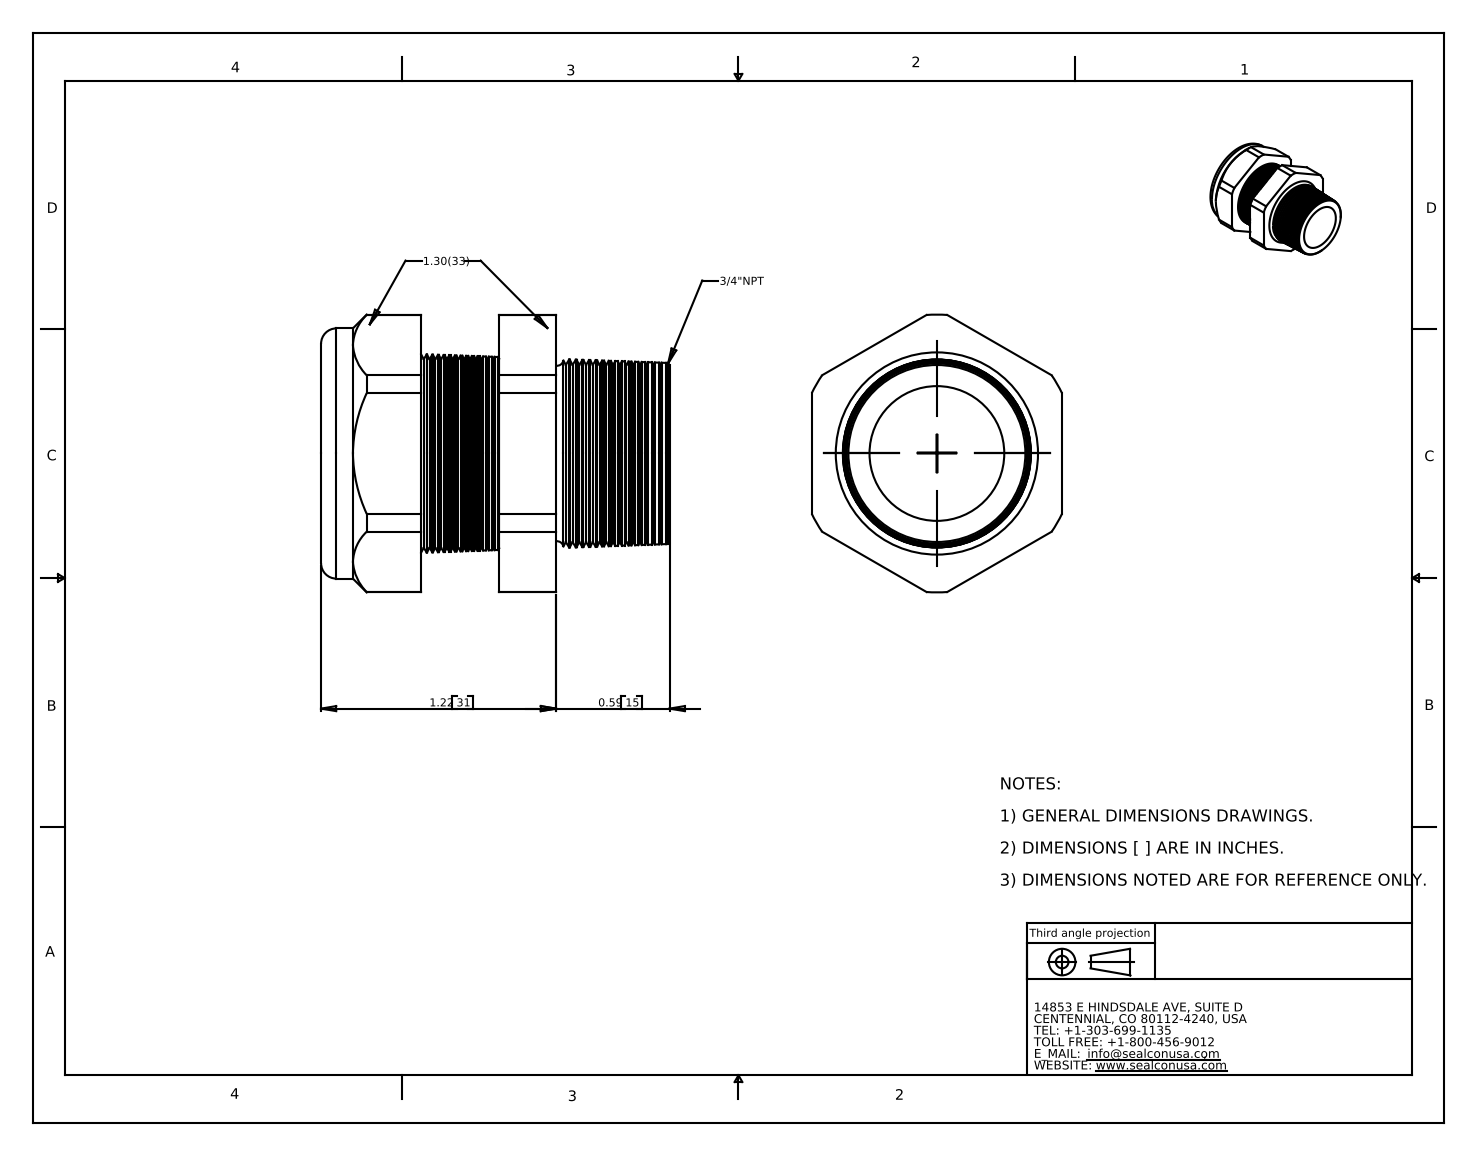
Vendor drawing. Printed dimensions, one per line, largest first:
1.22 31
0.59 15
